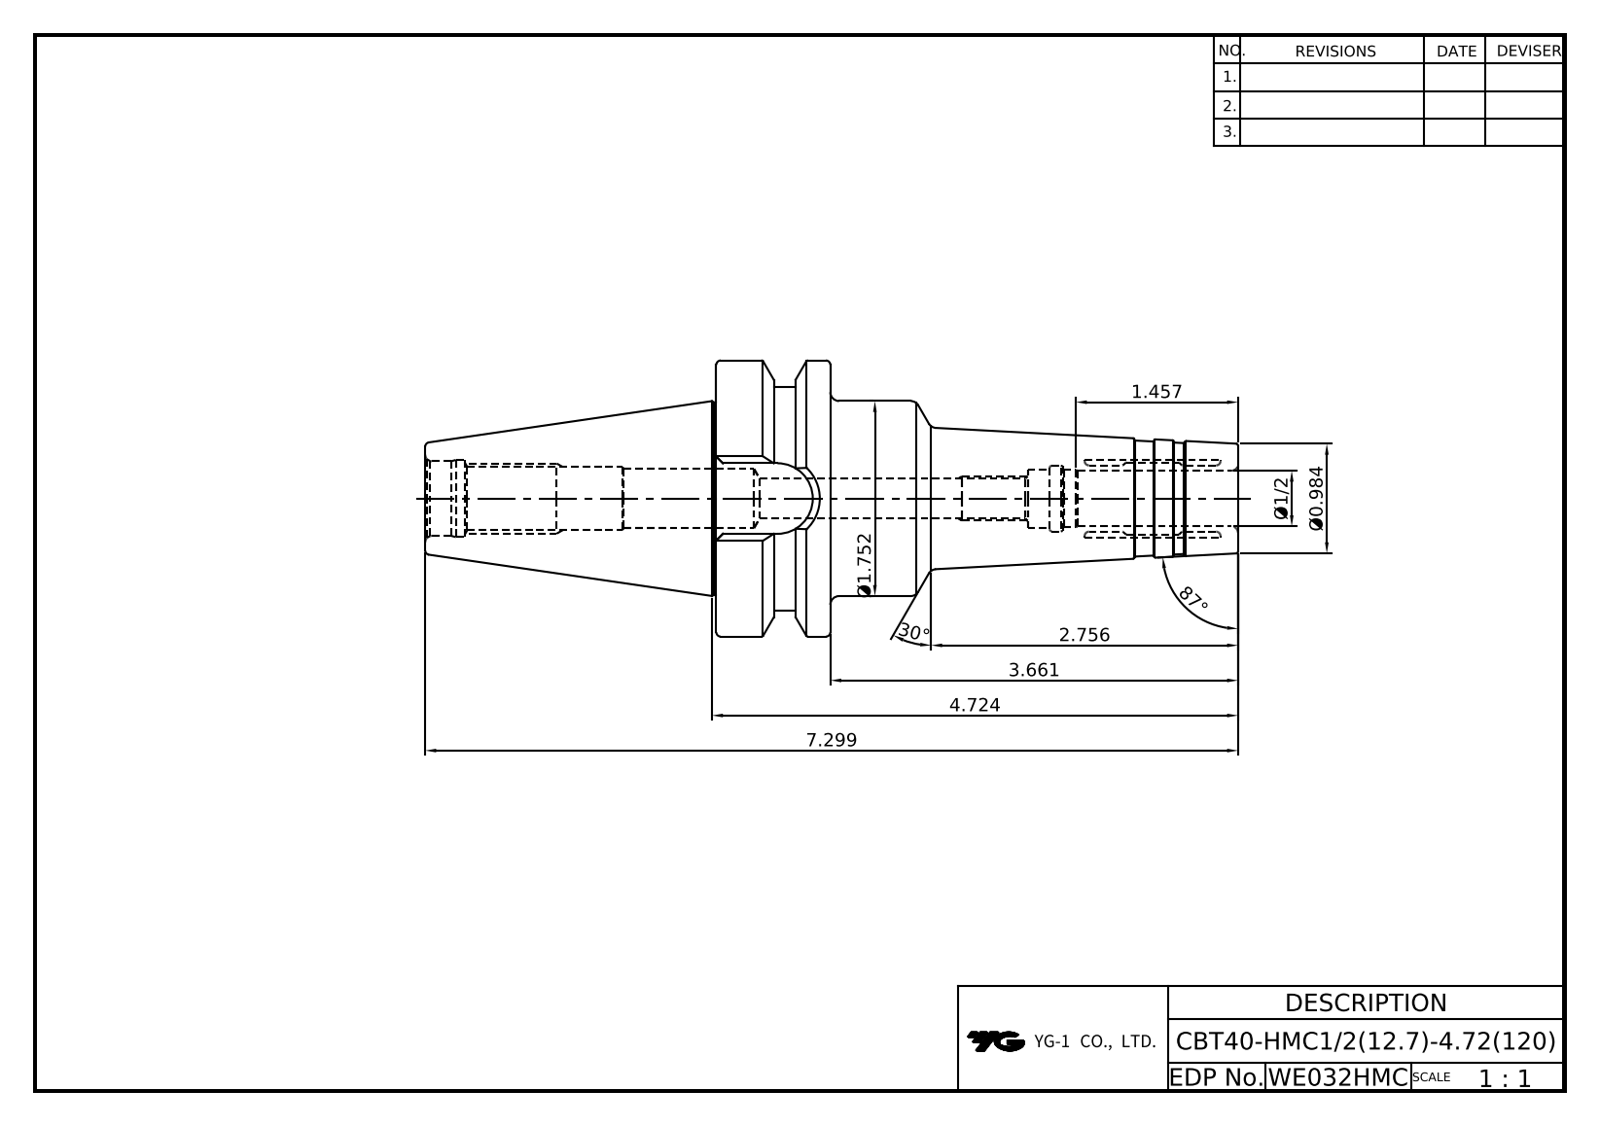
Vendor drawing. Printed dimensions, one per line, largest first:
87°
30°
7.299
4.724
3.661
2.756
Ø1.752
1.457
Ø0.984
Ø1/2
